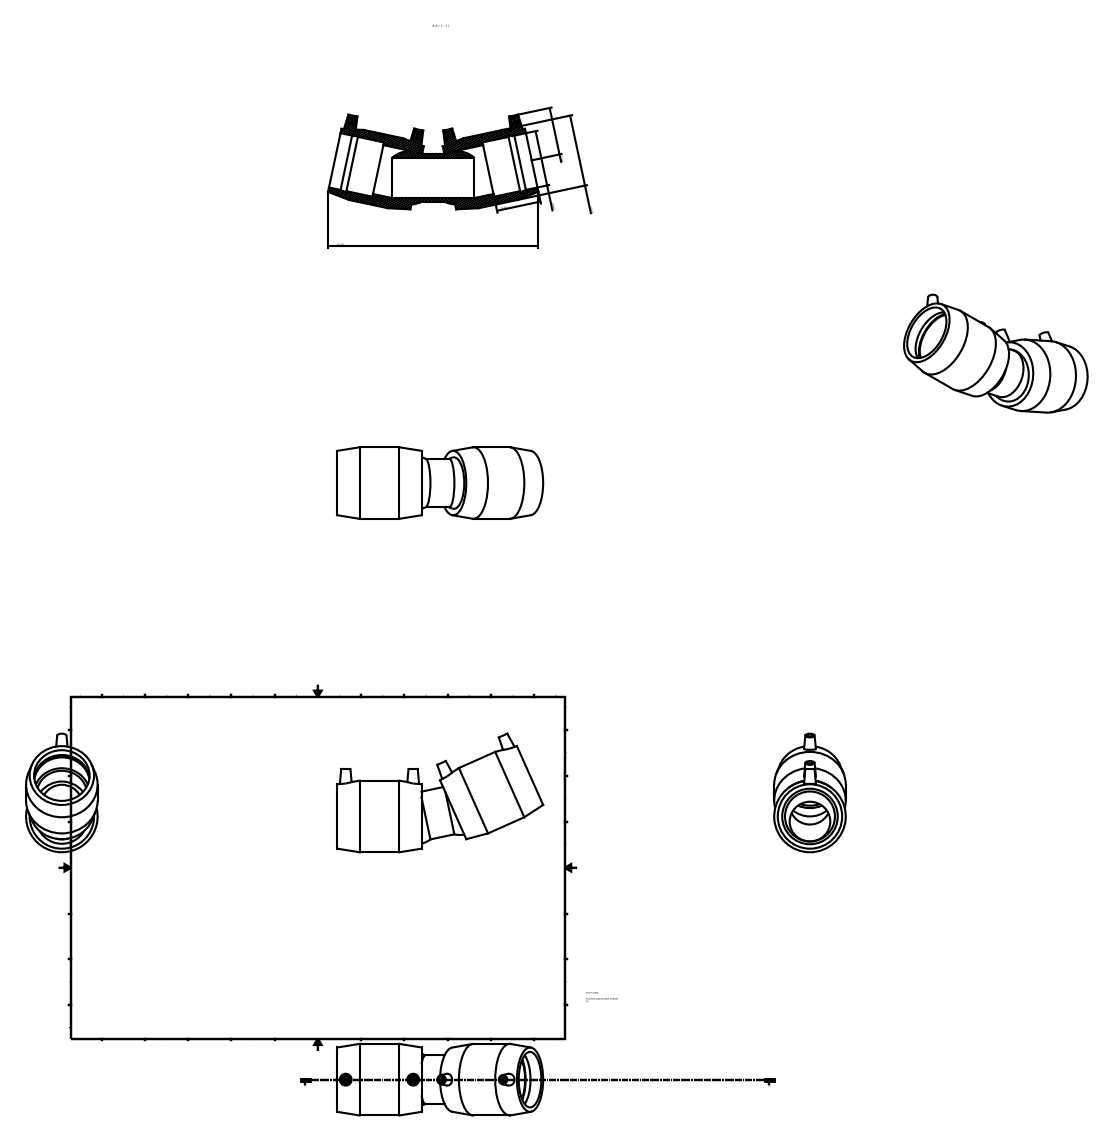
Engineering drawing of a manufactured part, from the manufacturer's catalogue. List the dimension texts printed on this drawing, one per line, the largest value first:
341,00
116,00
n90,00
77,00
72,00
